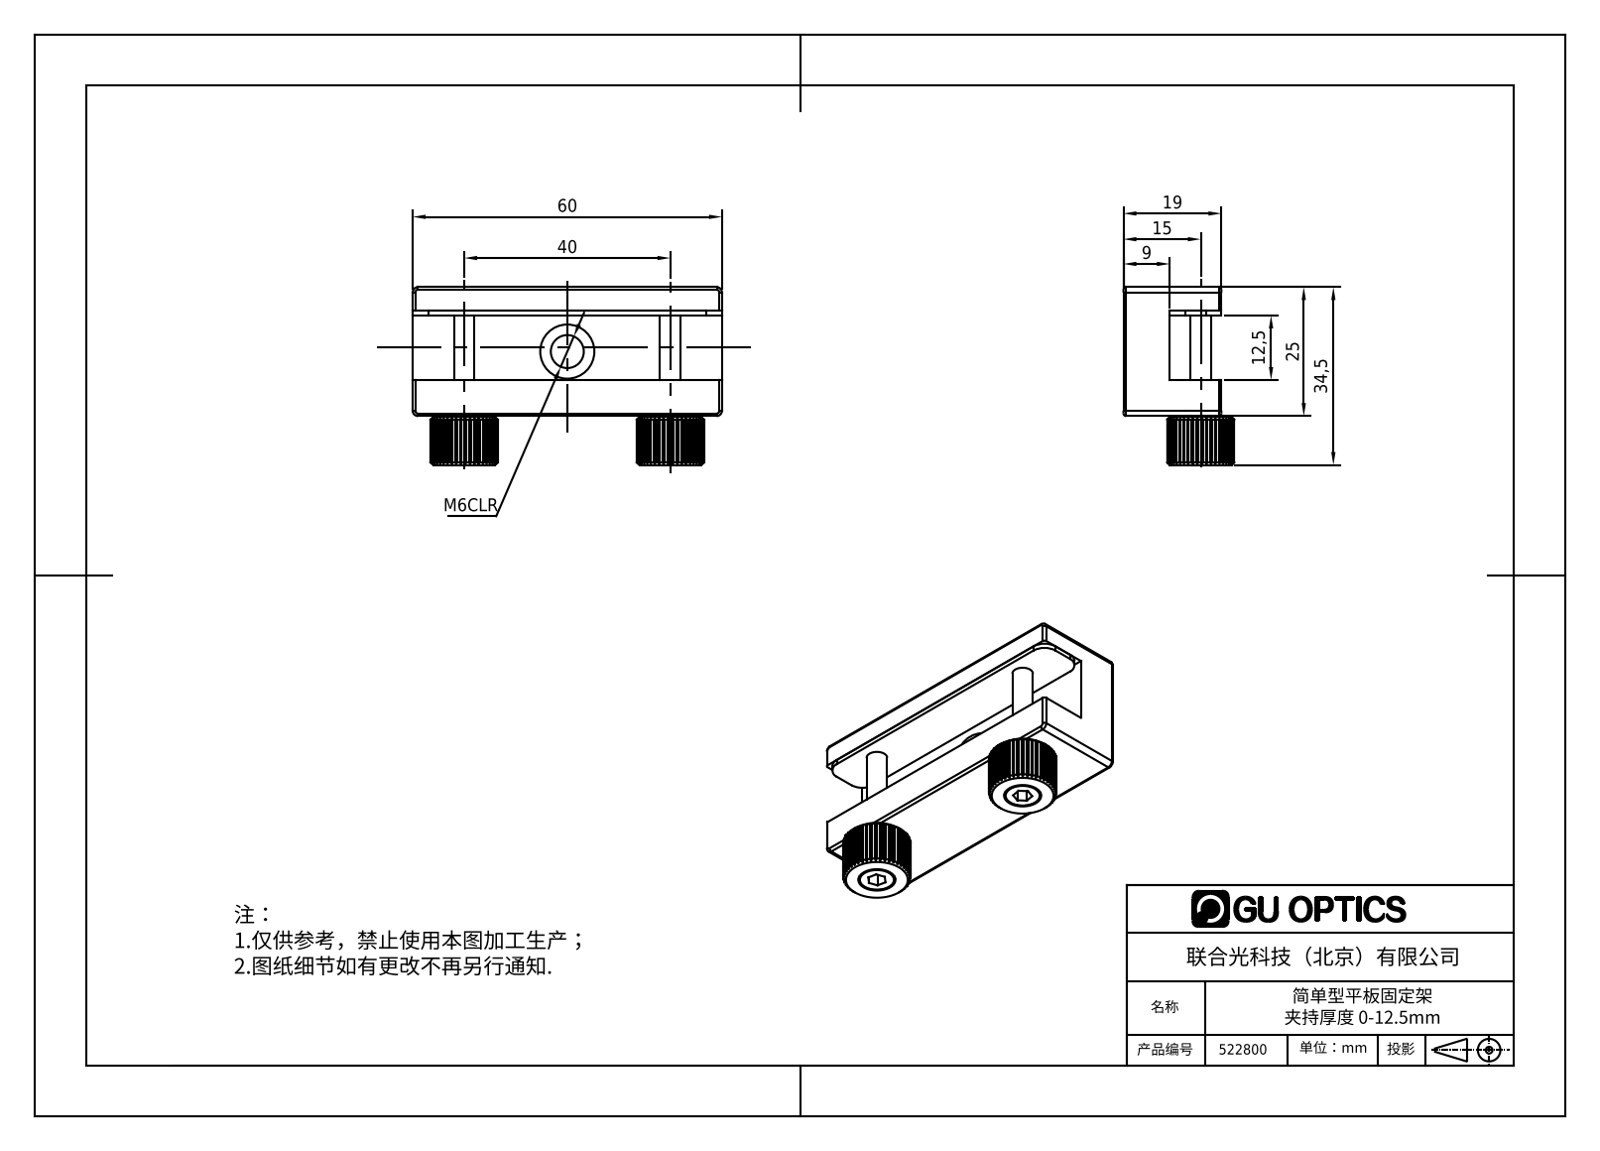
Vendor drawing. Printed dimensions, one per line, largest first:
60
40
34,5
25
19
15
12,5
9
M6CLR
